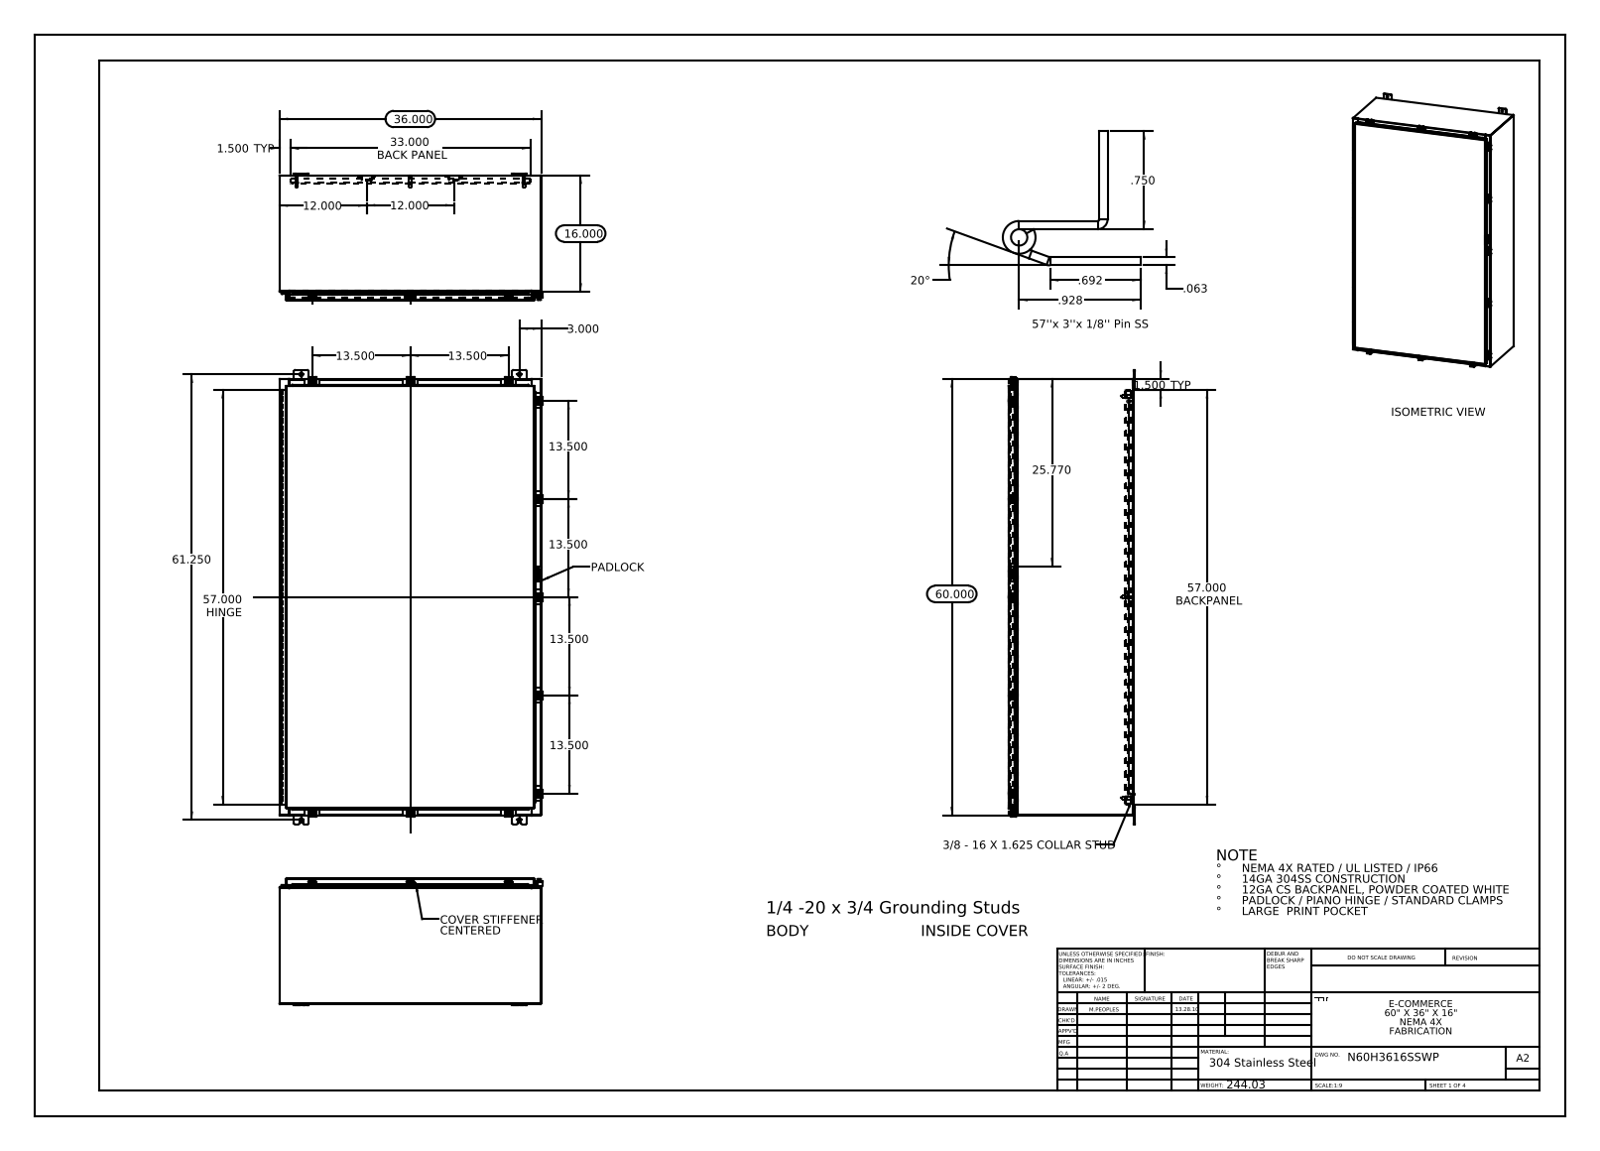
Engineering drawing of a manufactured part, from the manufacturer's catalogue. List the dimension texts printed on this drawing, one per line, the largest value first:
61.250
60.000
57.000 HINGE
57.000 BACKPANEL
36.000
33.000 BACK PANEL
25.770
20°
16.000
13.500
13.500
13.500
13.500
13.500
13.500
12.000
12.000
3.000
1.500 TYP
1.500 TYP
.928
.750
.692
.063
